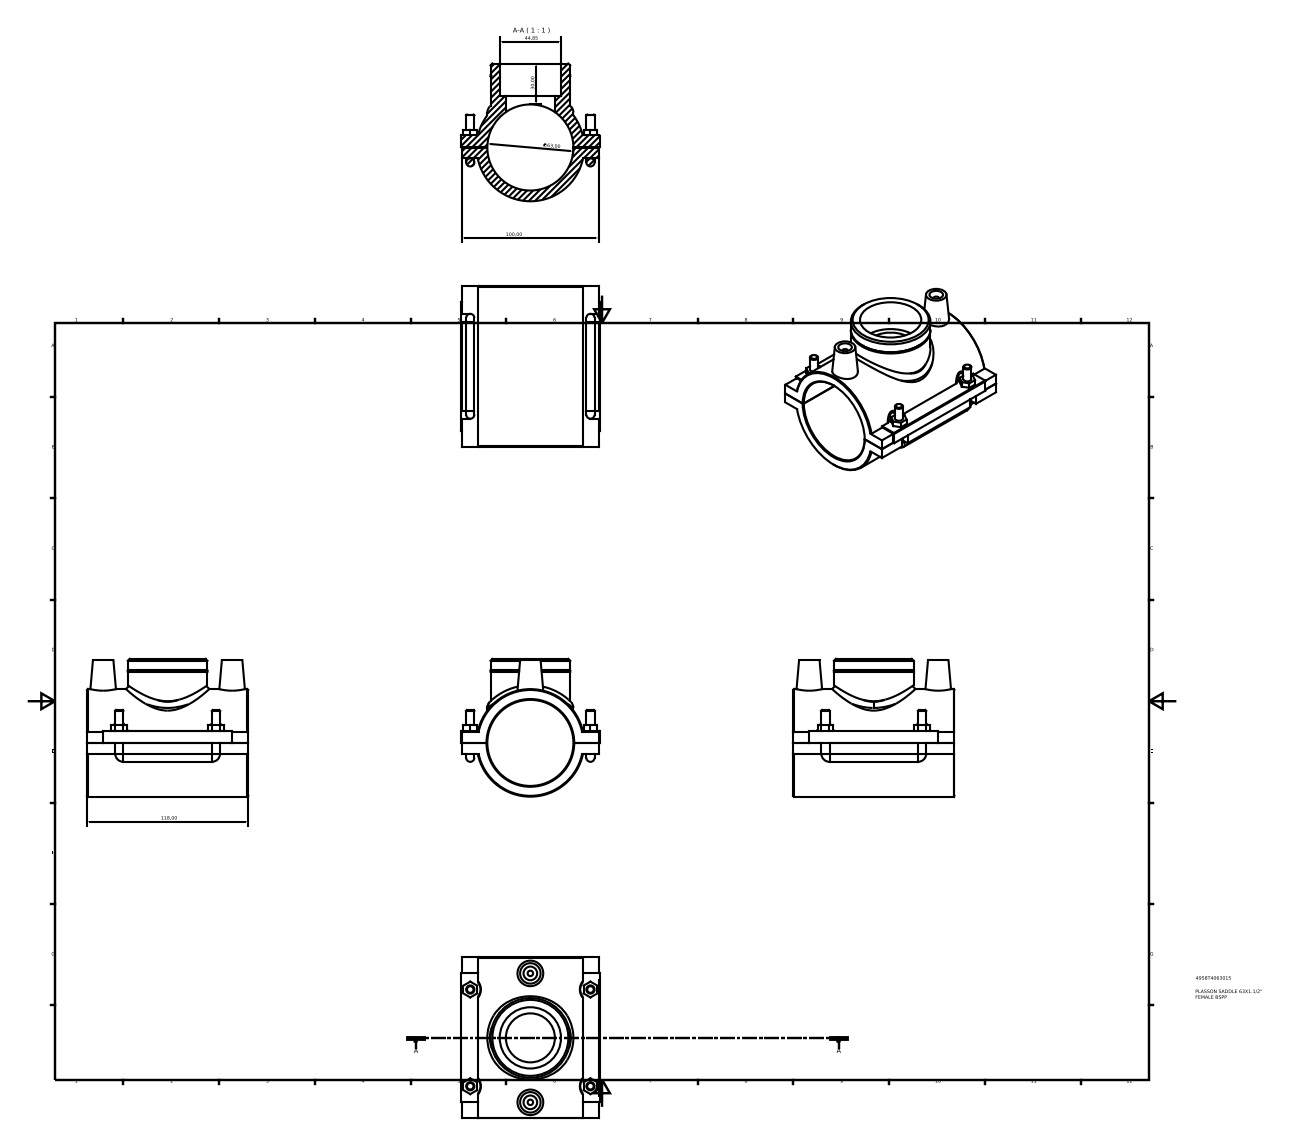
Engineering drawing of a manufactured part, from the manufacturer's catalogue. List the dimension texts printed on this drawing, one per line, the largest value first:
118,00
100,00
∅63,00
44,85
30,00
